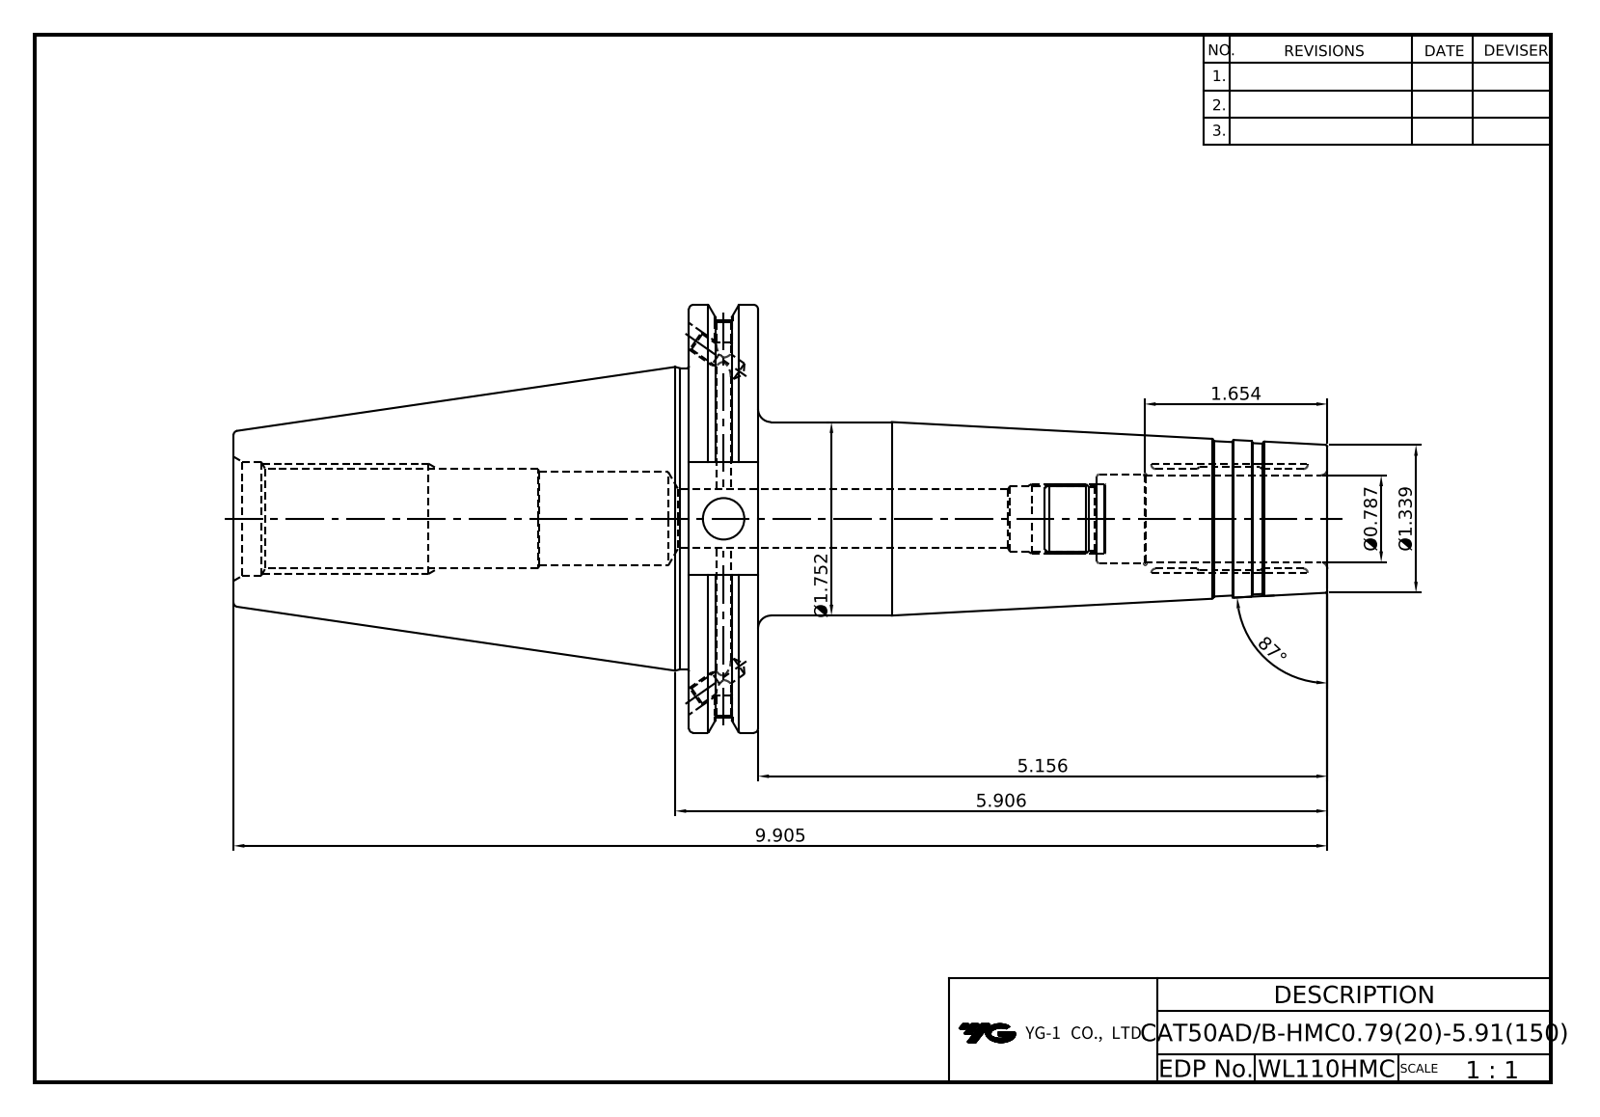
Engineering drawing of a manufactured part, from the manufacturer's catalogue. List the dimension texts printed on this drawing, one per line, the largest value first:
87°
9.905
5.906
5.156
Ø1.752
1.654
Ø1.339
Ø0.787
